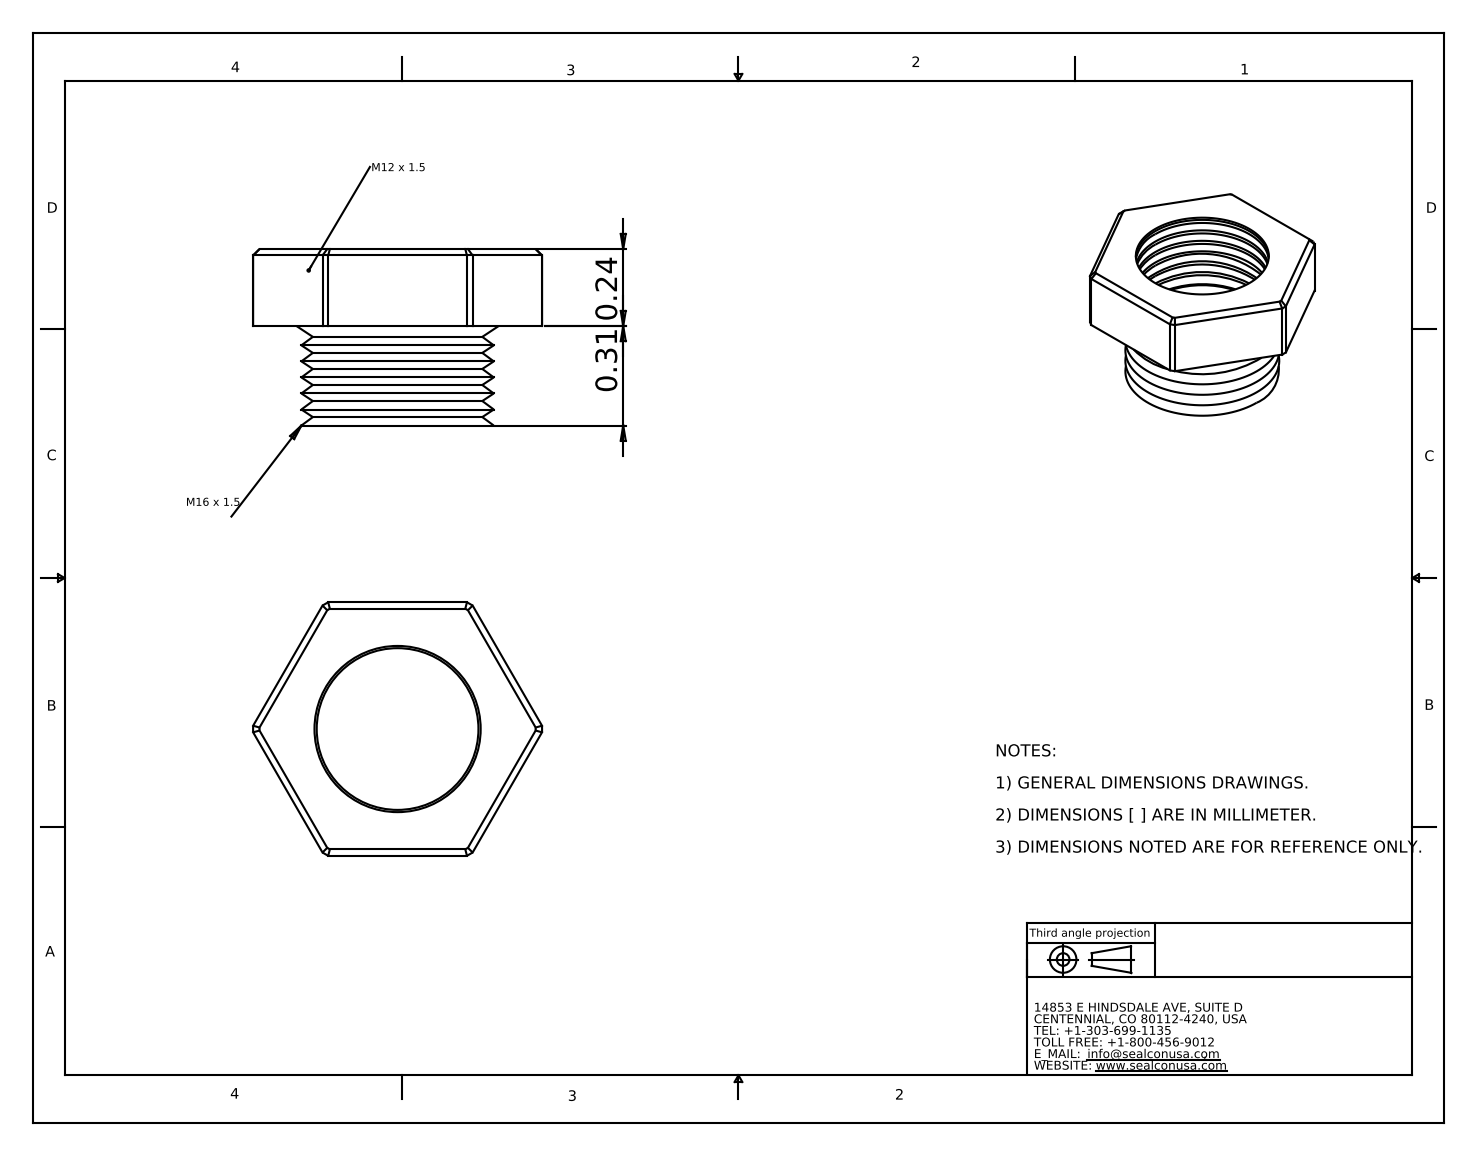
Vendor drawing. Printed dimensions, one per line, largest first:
0.31
0.24
